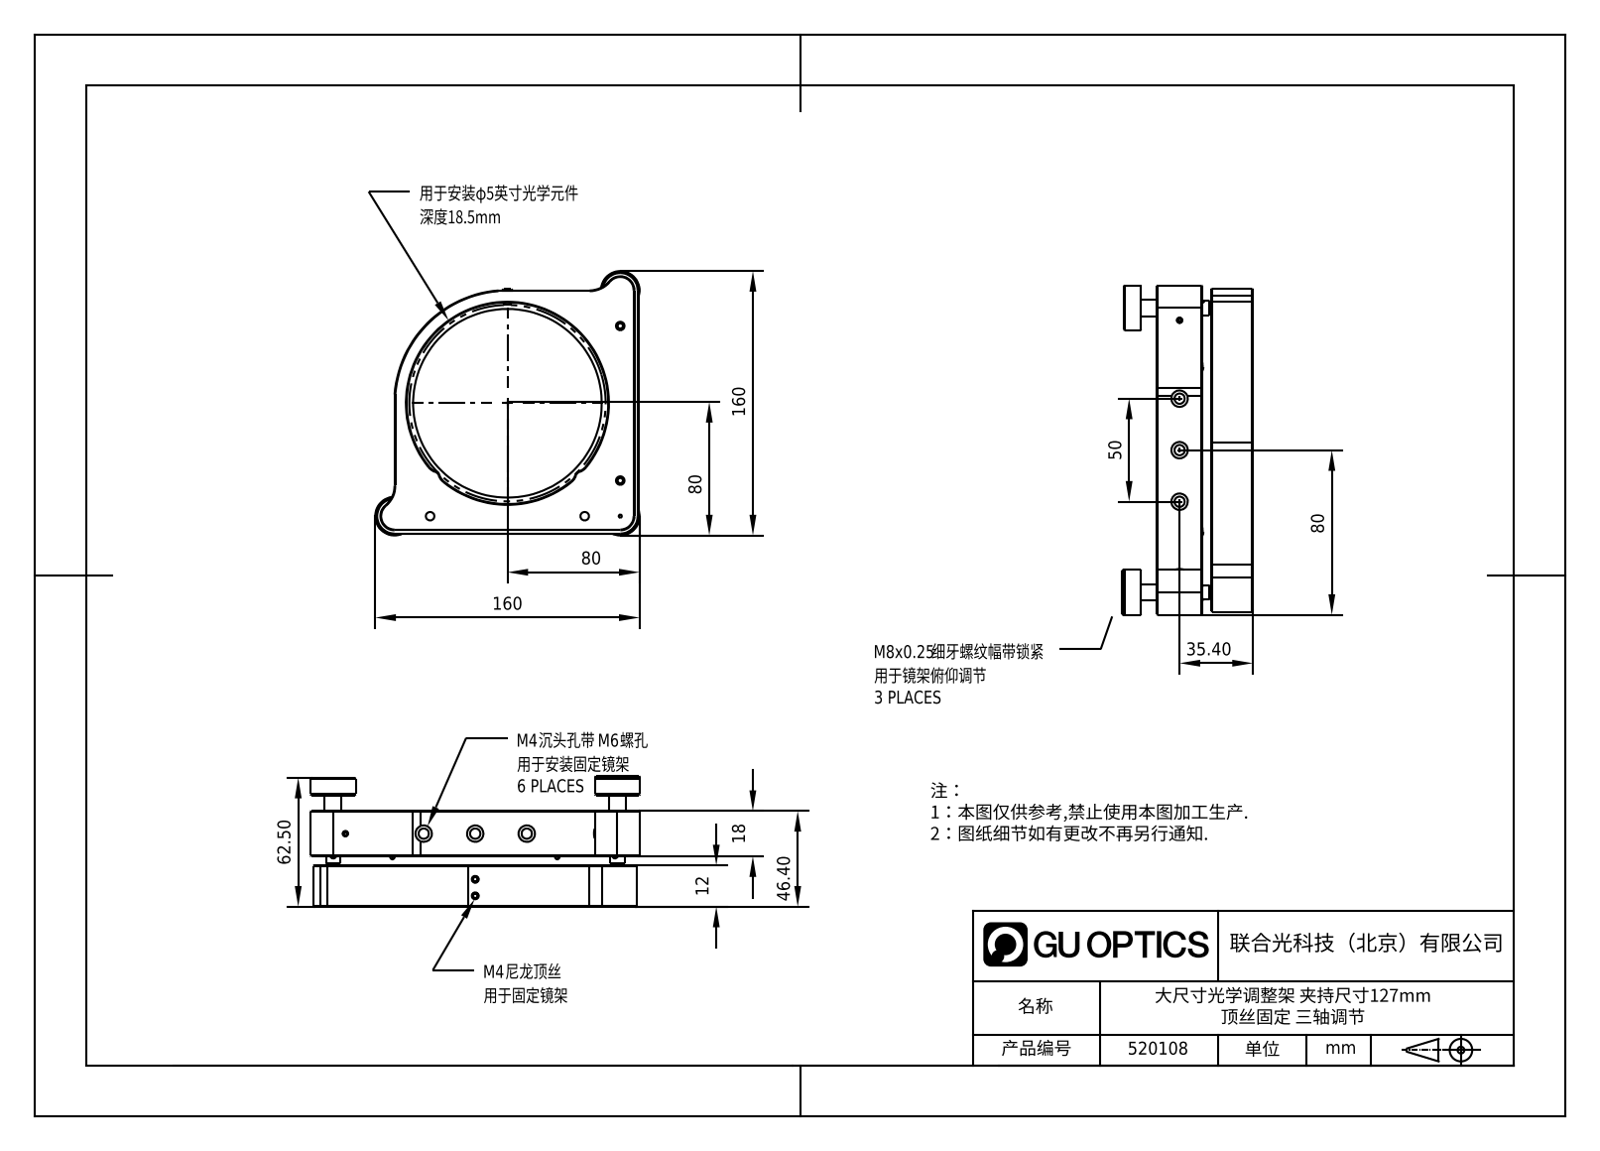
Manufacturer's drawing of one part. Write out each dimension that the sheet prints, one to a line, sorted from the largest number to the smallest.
160
160
80
80
80
62.50
50
46.40
35.40
18
12
